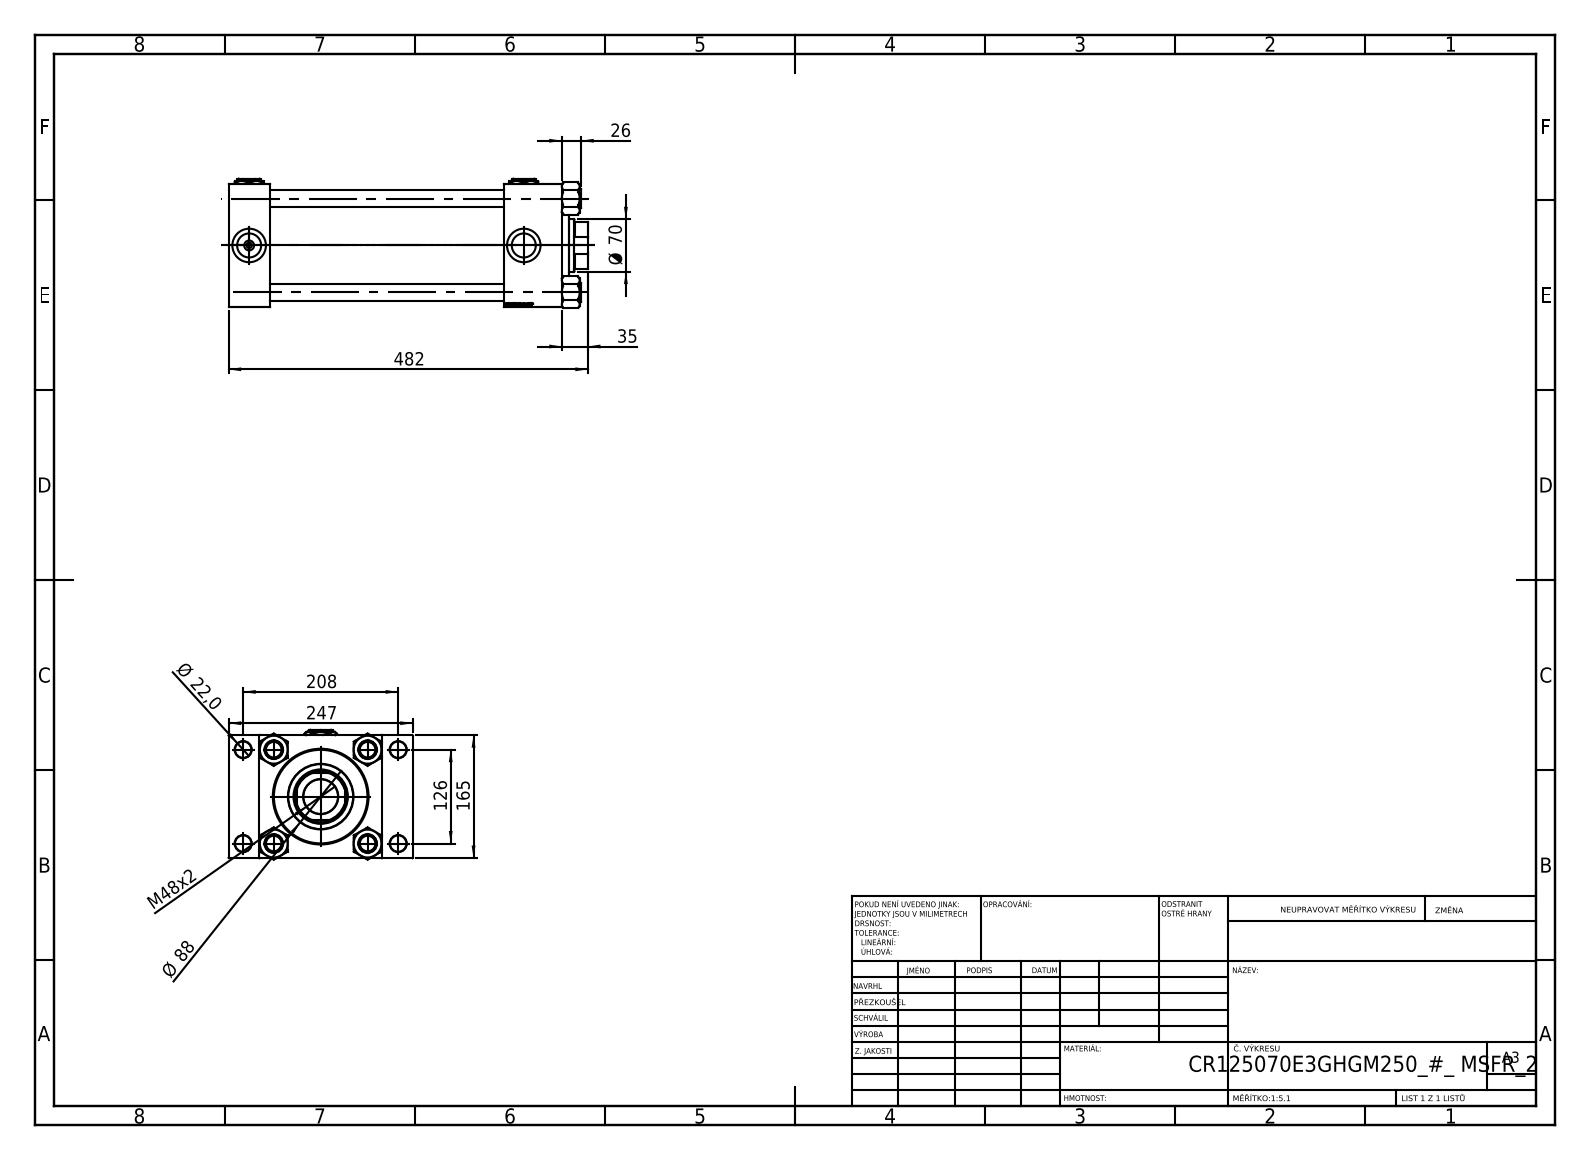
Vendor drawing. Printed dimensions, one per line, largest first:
482
247
208
165
126
Ø 88
Ø 70
M48x2
35
26
Ø 22,0
